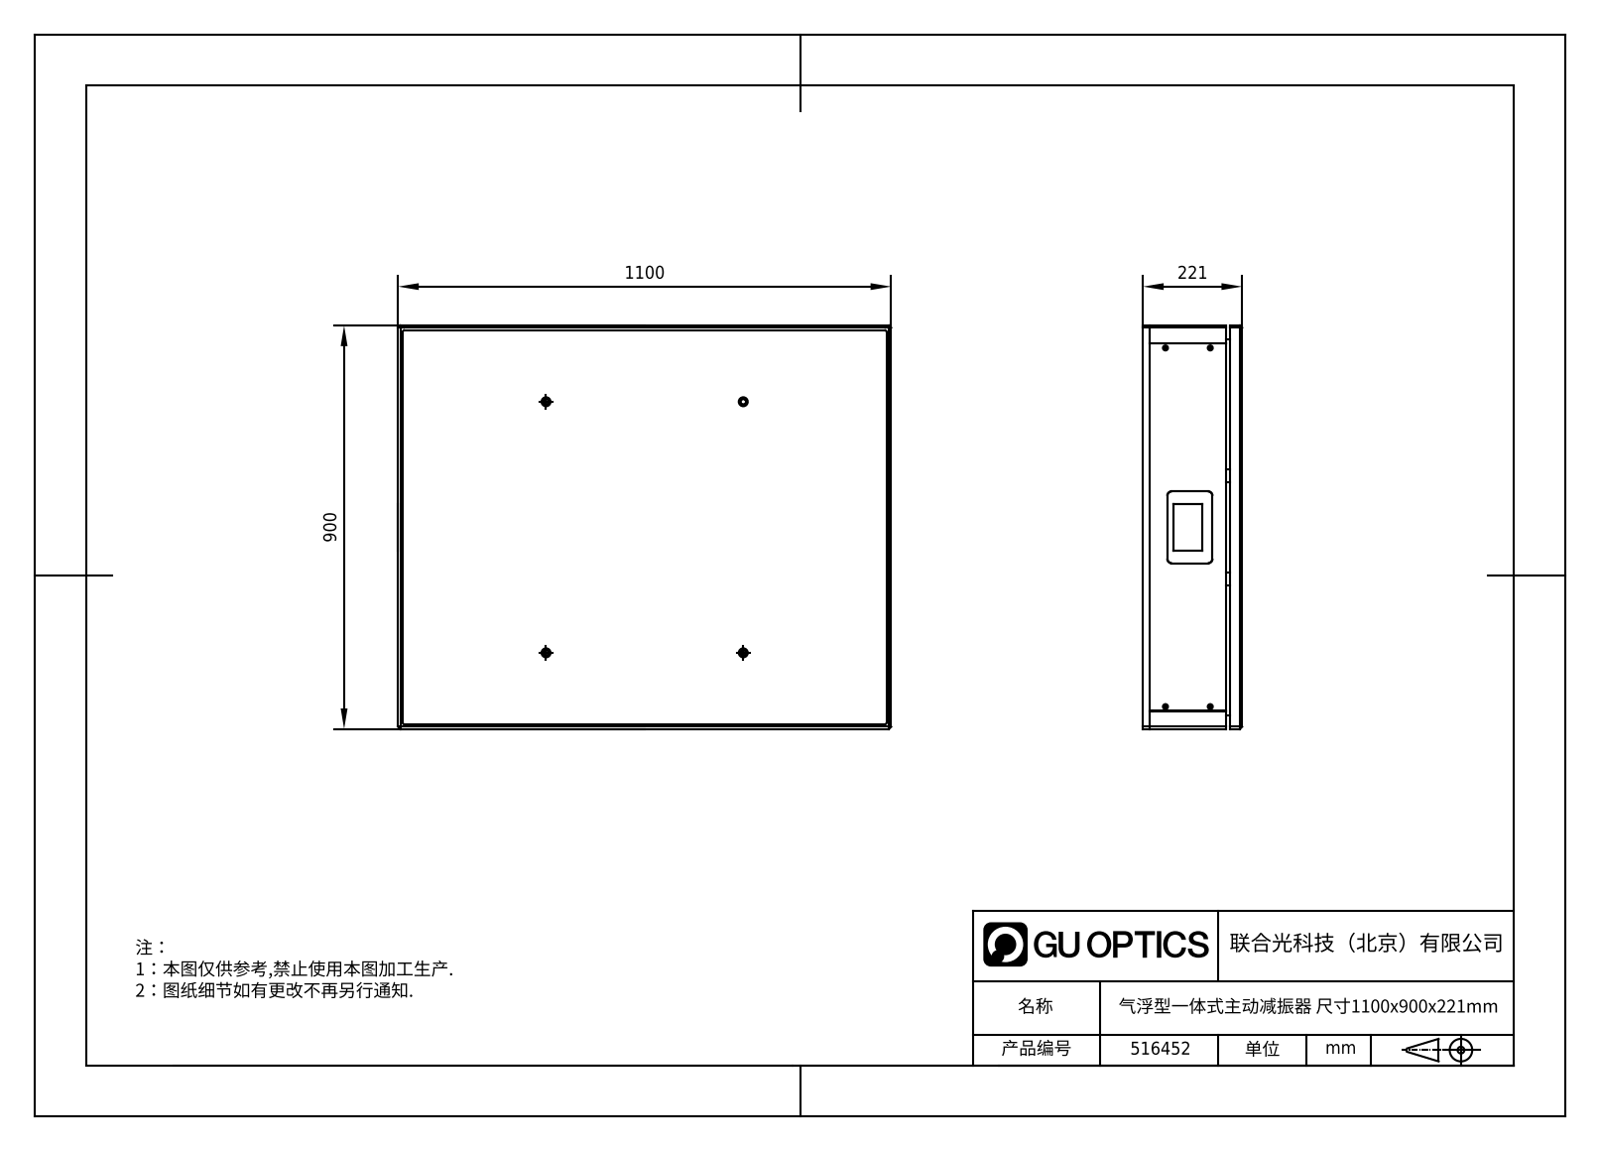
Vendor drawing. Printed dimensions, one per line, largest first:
1100
900
221
